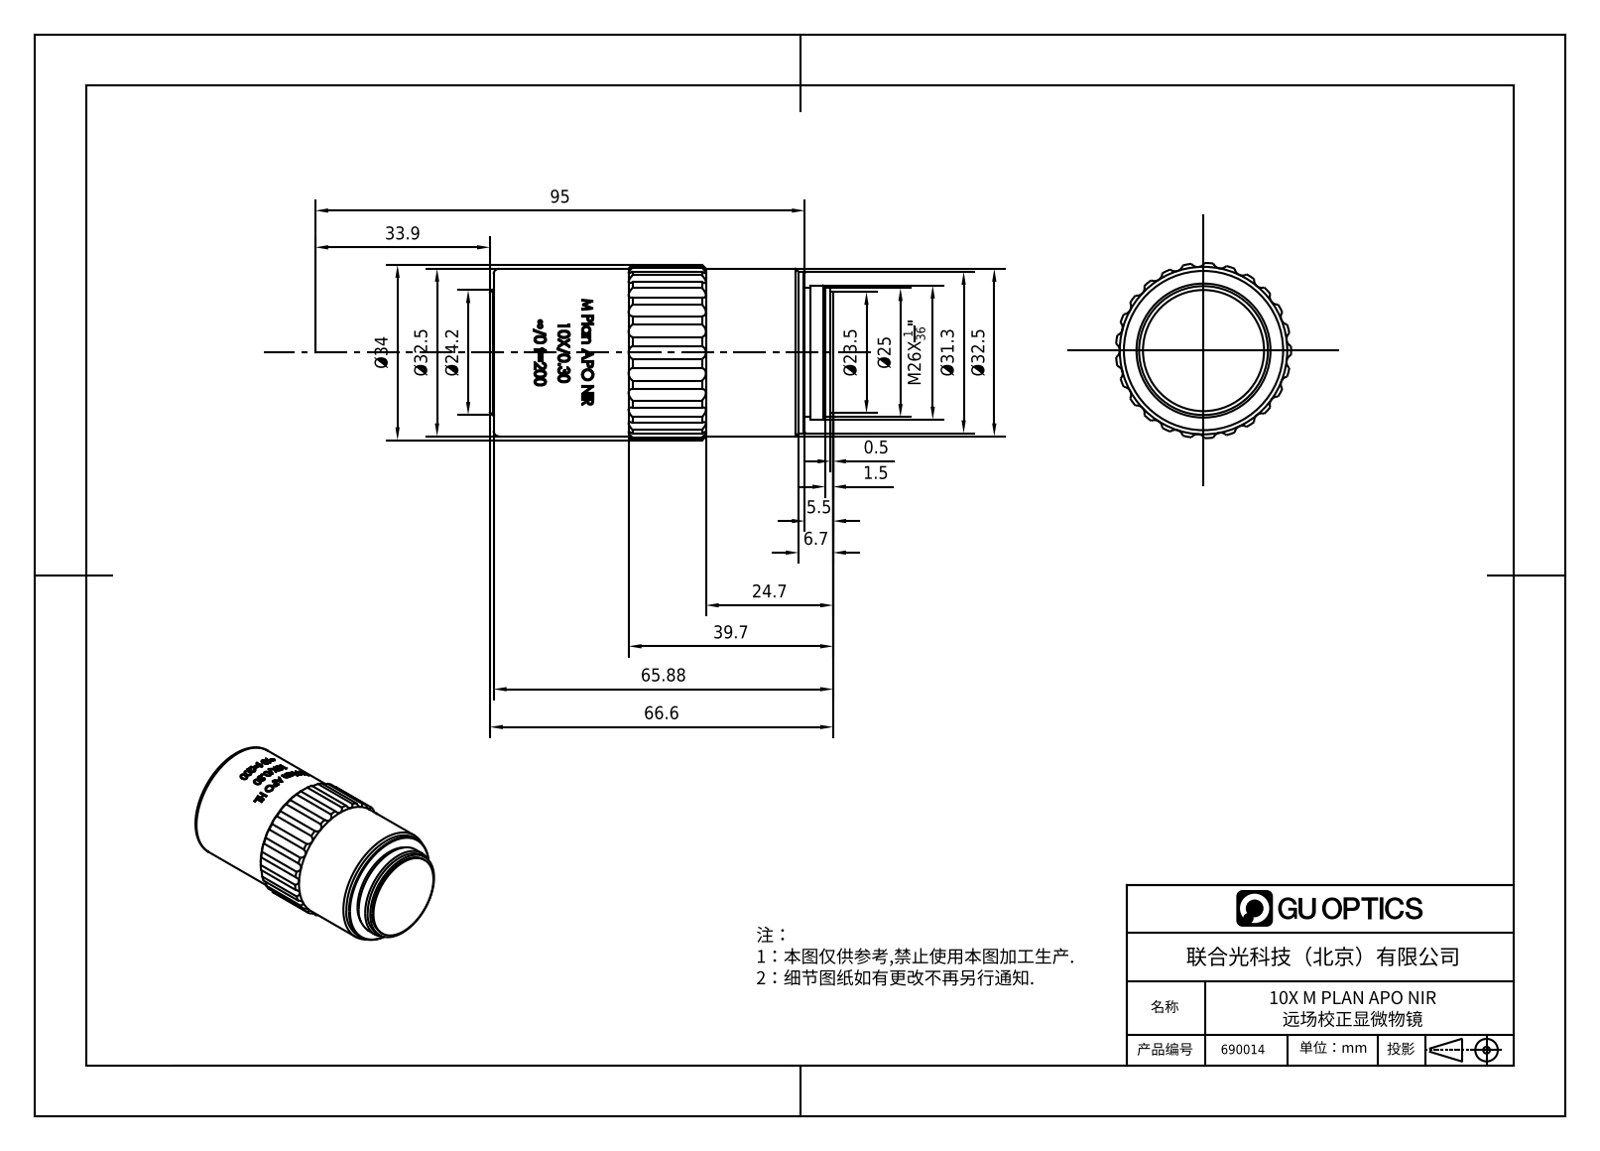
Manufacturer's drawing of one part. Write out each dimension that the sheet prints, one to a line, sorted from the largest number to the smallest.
95
66.6
65.88
39.7
Ø34
33.9
Ø32.5
Ø32.5
Ø31.3
M26X1/36"
Ø25
24.7
Ø24.2
Ø23.5
6.7
5.5
1.5
0.5
